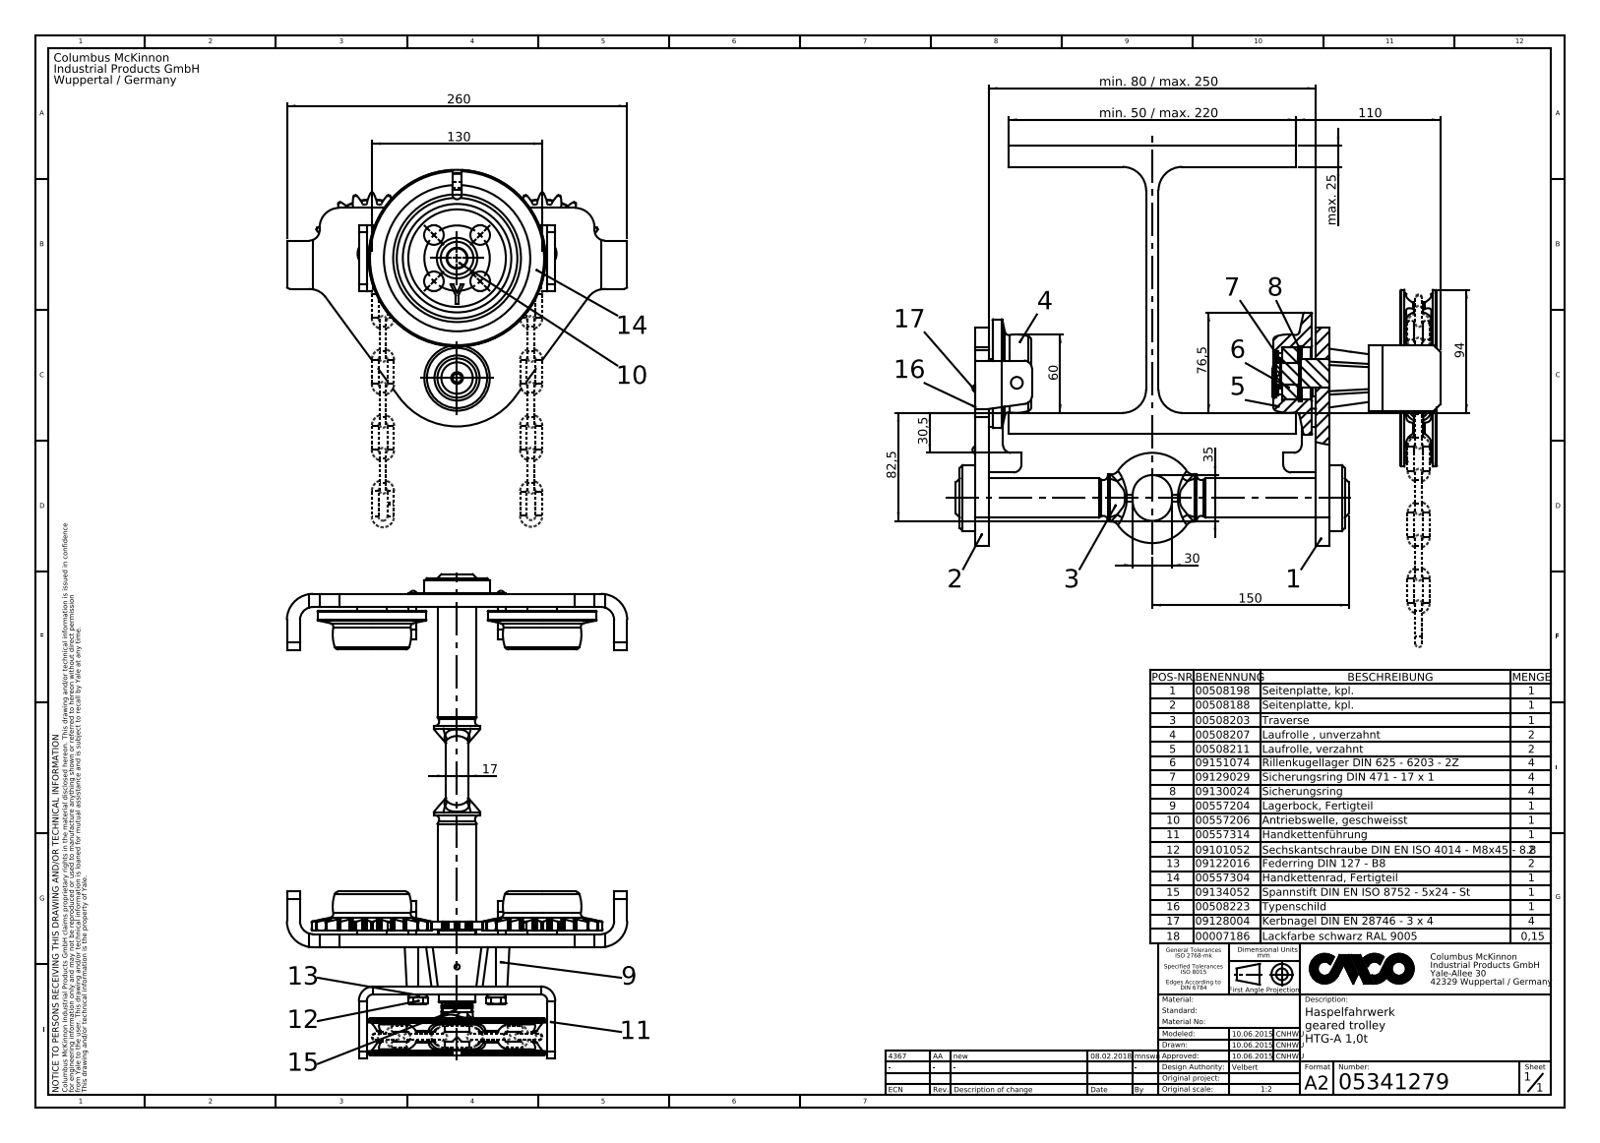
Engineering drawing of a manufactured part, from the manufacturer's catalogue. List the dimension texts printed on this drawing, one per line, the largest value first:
260
150
130
110
94
82,5
min. 80 / max. 250
76,5
60
min. 50 / max. 220
35
30,5
30
max. 25
17
